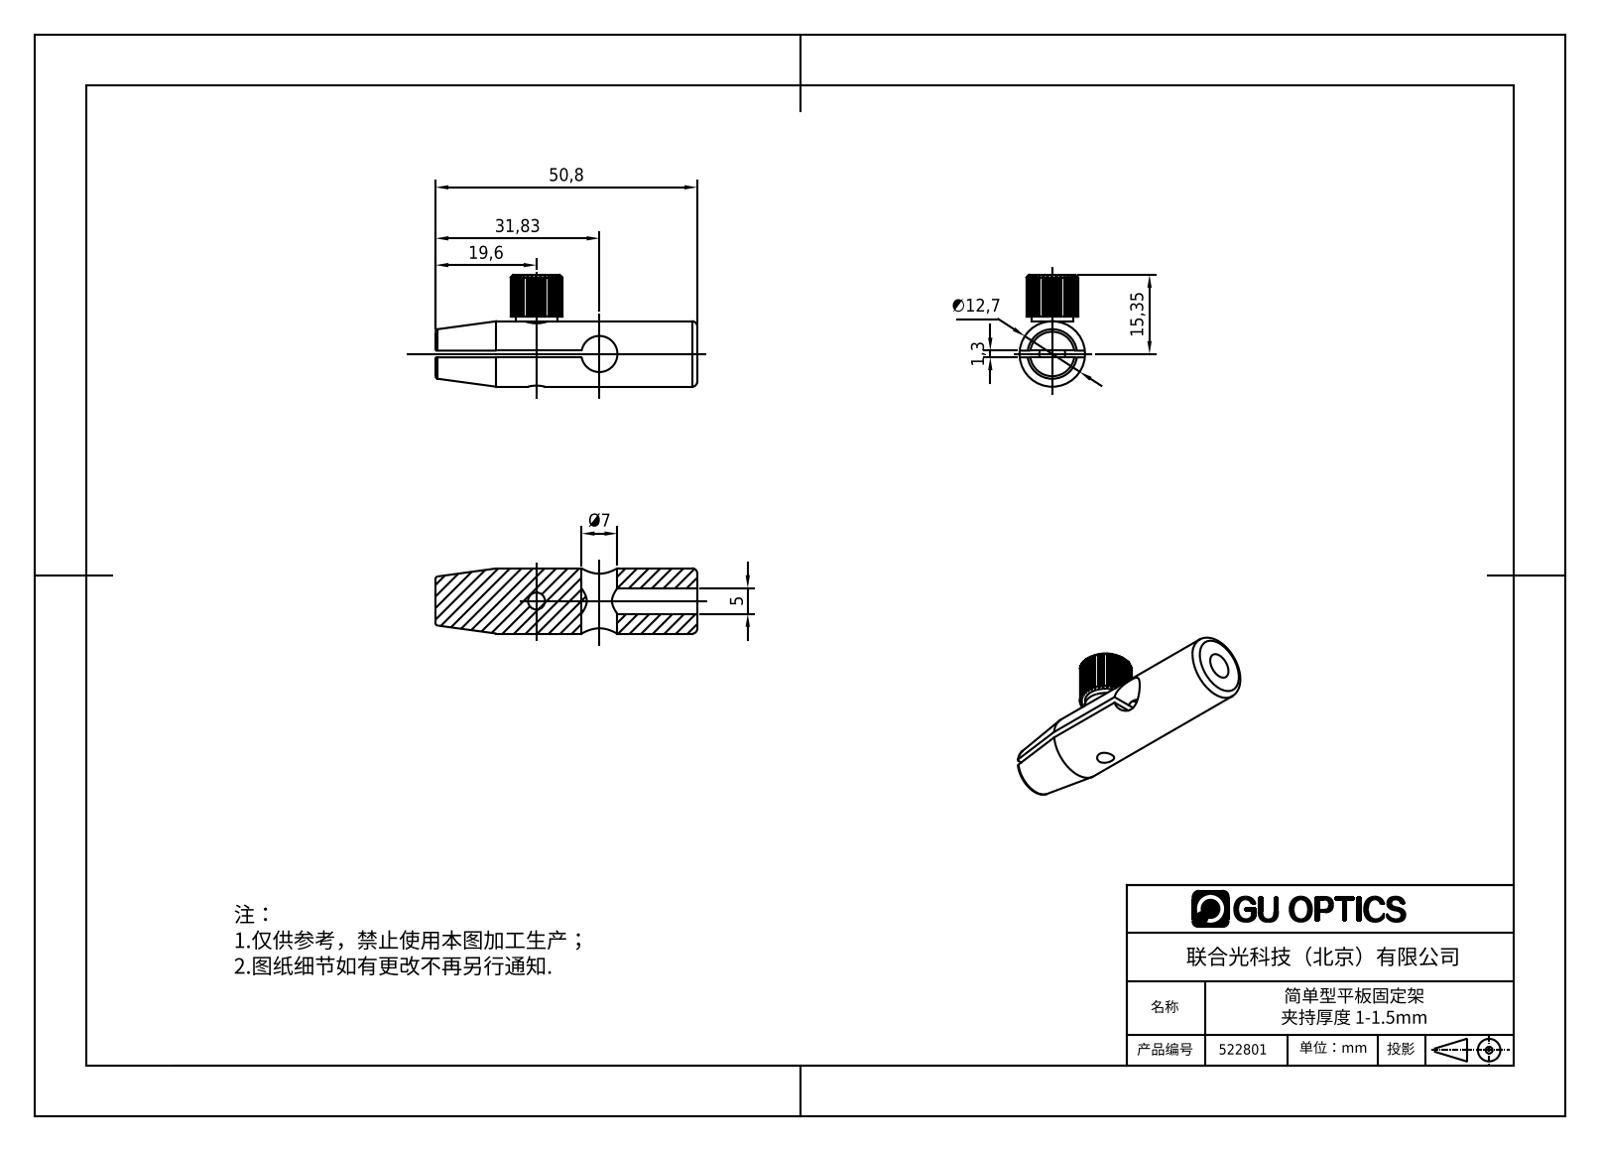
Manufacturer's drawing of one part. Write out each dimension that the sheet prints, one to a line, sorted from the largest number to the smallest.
50,8
31,83
19,6
15,35
∅12,7
Ø7
5
1,3
